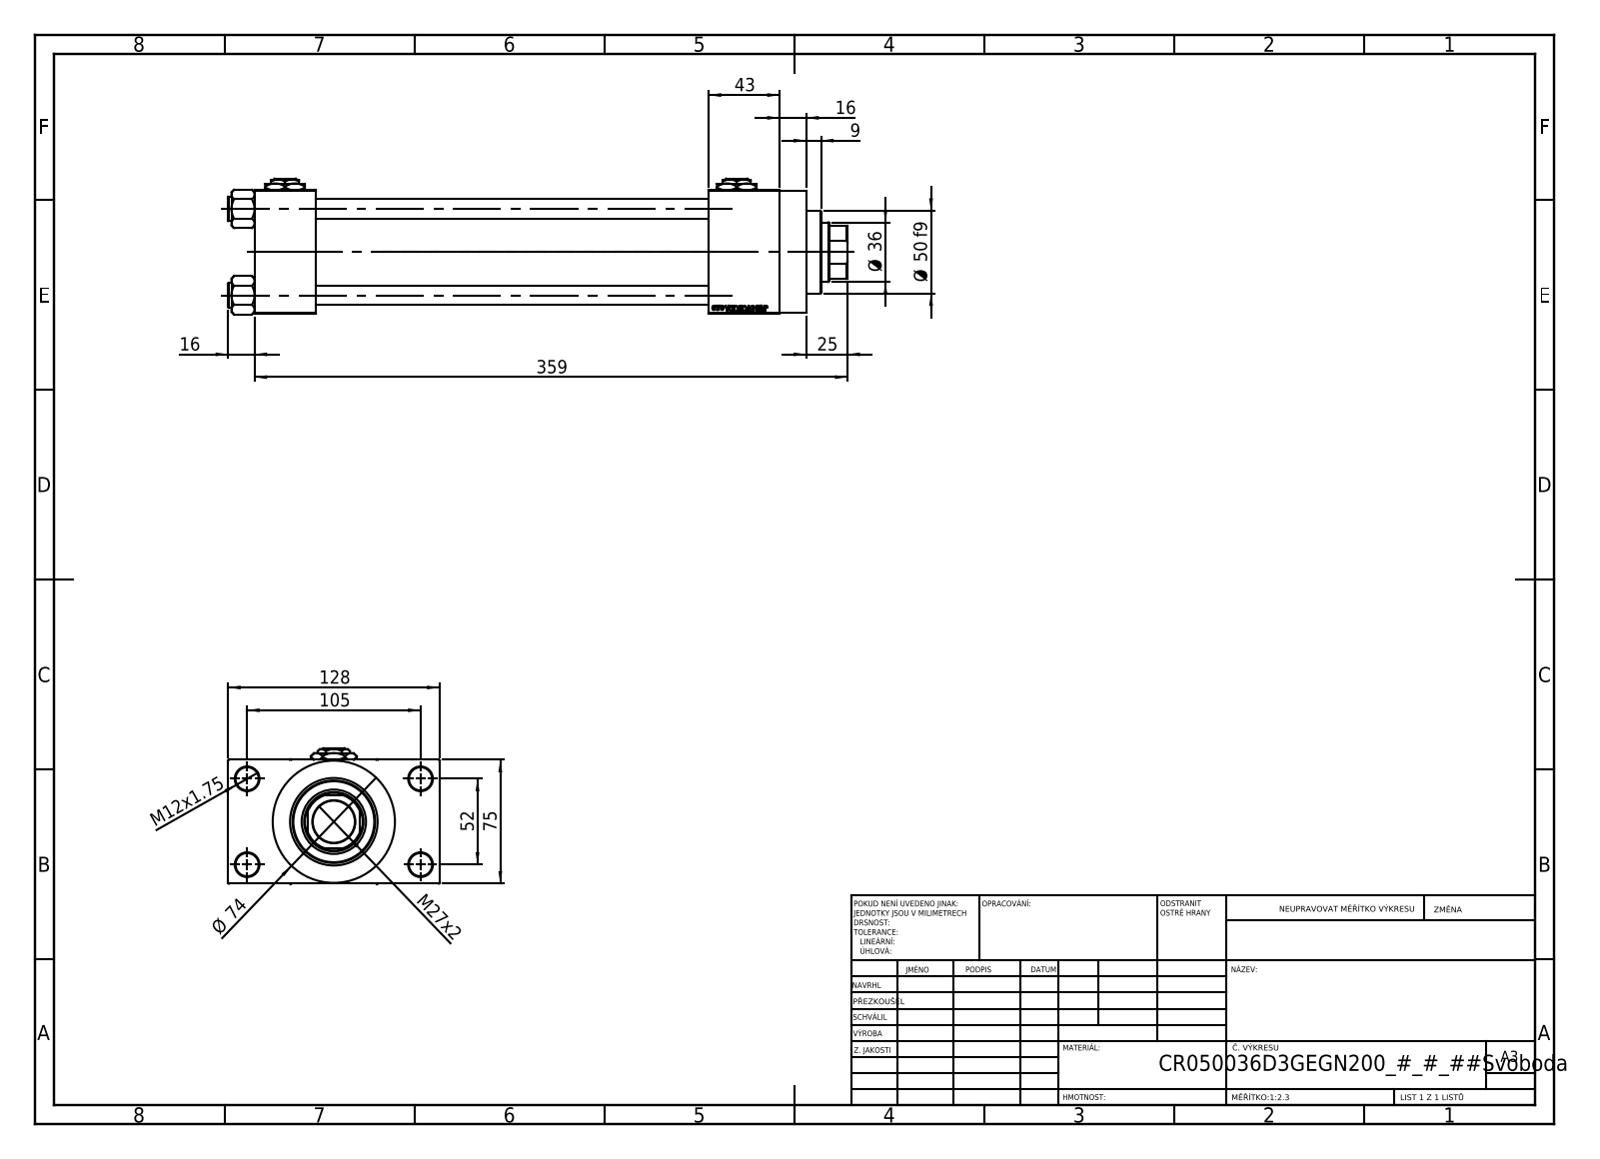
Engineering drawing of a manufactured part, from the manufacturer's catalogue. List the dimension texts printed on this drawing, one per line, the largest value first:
359
128
105
75
Ø 74
52
Ø 50 f9
43
Ø 36
M27x2
25
16
16
M12x1.75
9
